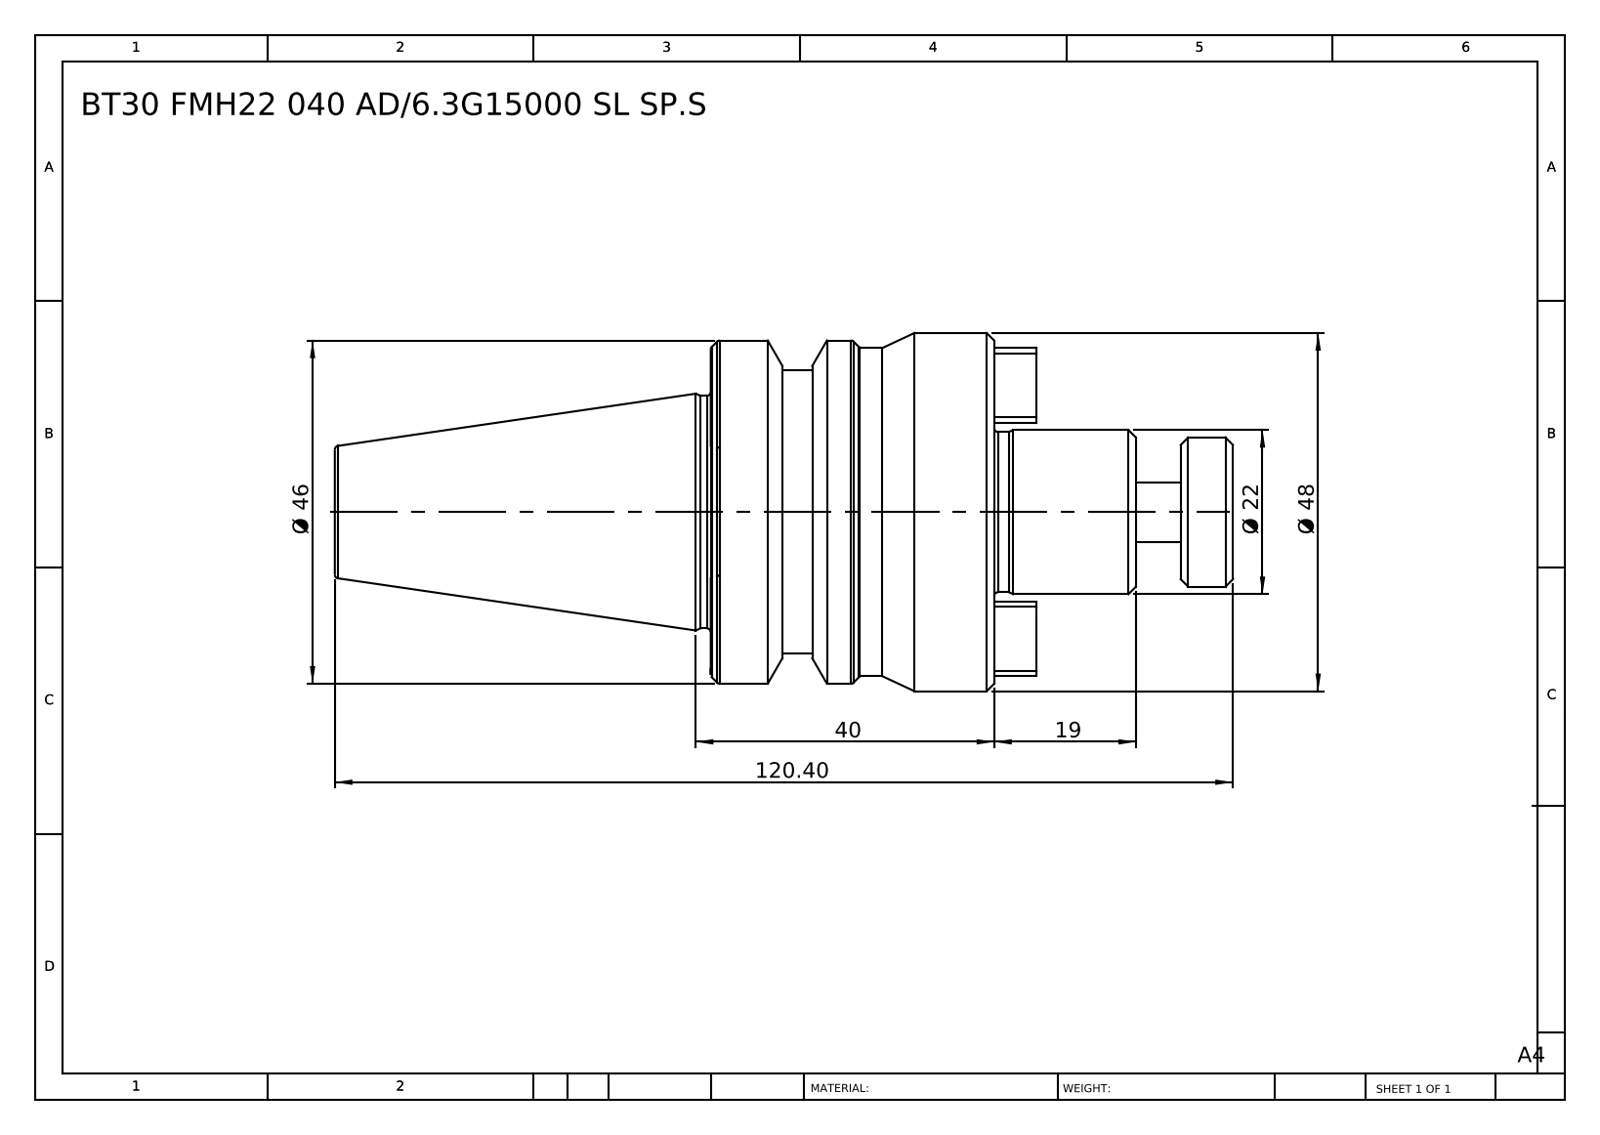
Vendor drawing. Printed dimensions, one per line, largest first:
120.40
Ø 48
Ø 46
40
Ø 22
19
